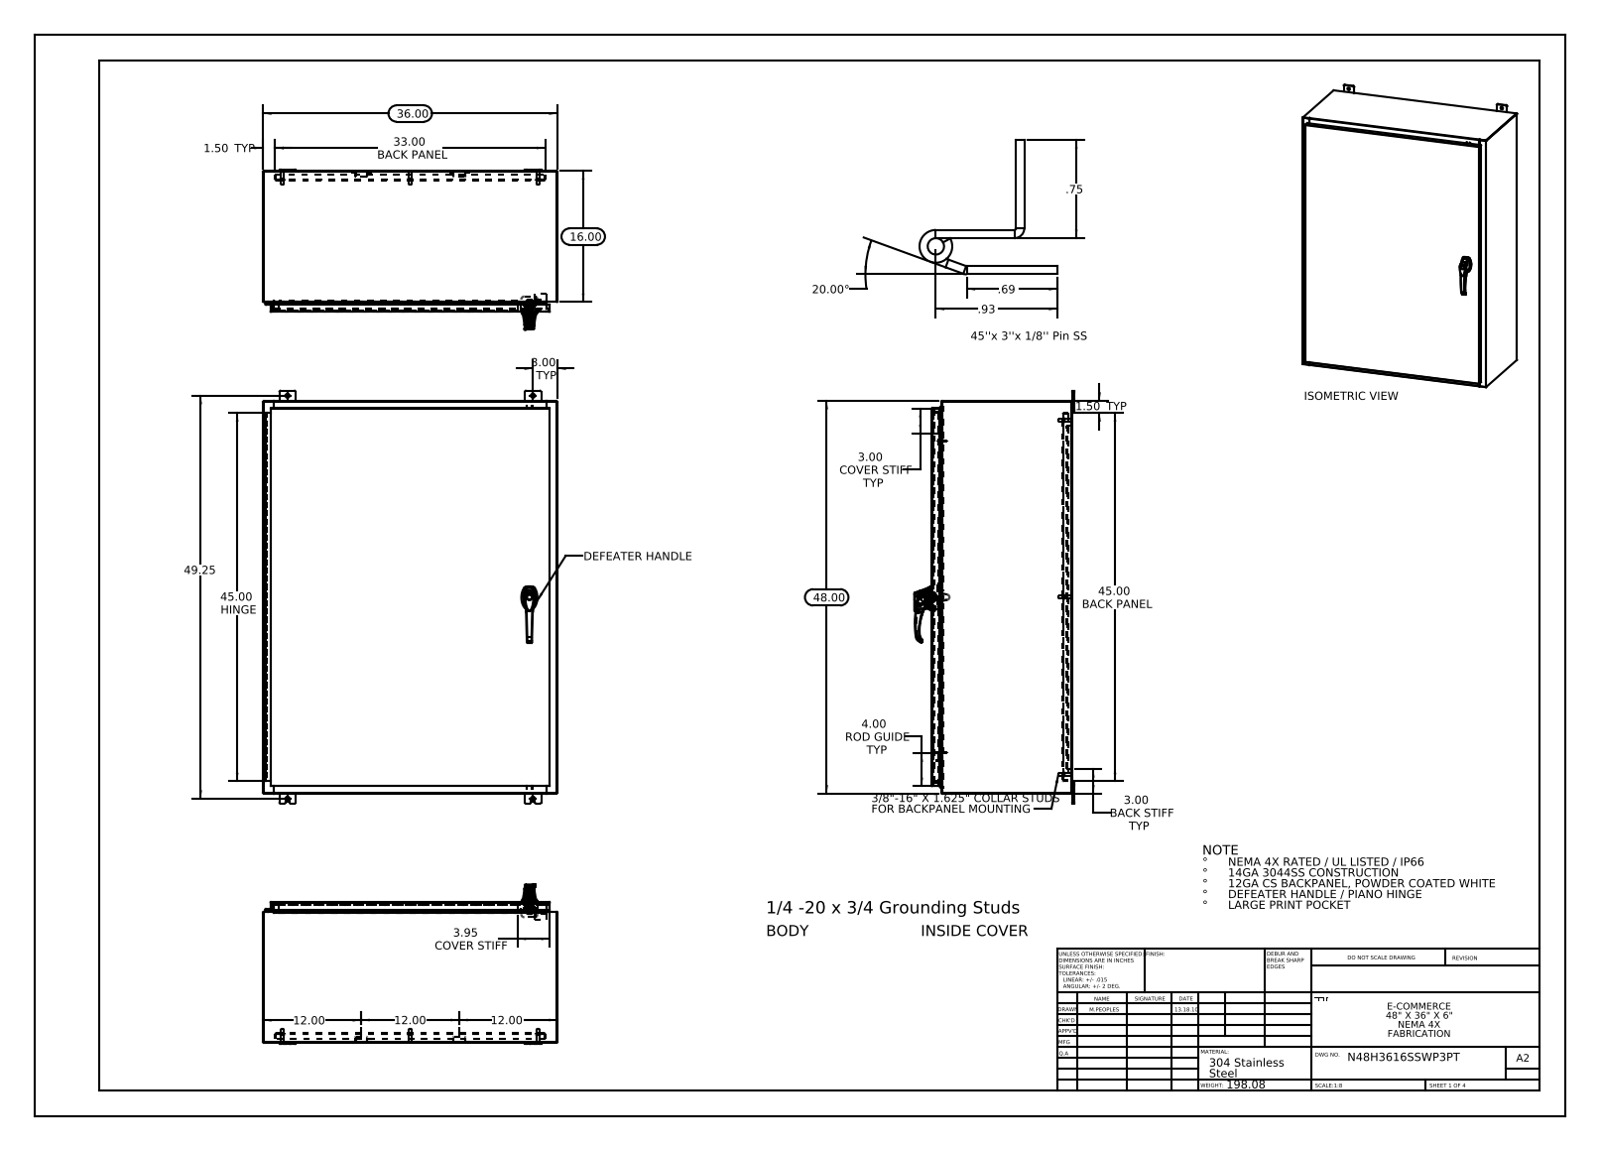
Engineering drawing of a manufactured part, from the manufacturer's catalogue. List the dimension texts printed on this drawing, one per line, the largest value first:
49.25
48.00
45.00 HINGE
45.00 BACK PANEL
36.00
33.00 BACK PANEL
20.00°
16.00
12.00
12.00
12.00
4.00 ROD GUIDE TYP
3.95 COVER STIFF
3.00 TYP
3.00 COVER STIFF TYP
3.00 BACK STIFF TYP
1.50 TYP
1.50 TYP
.93
.75
.69
